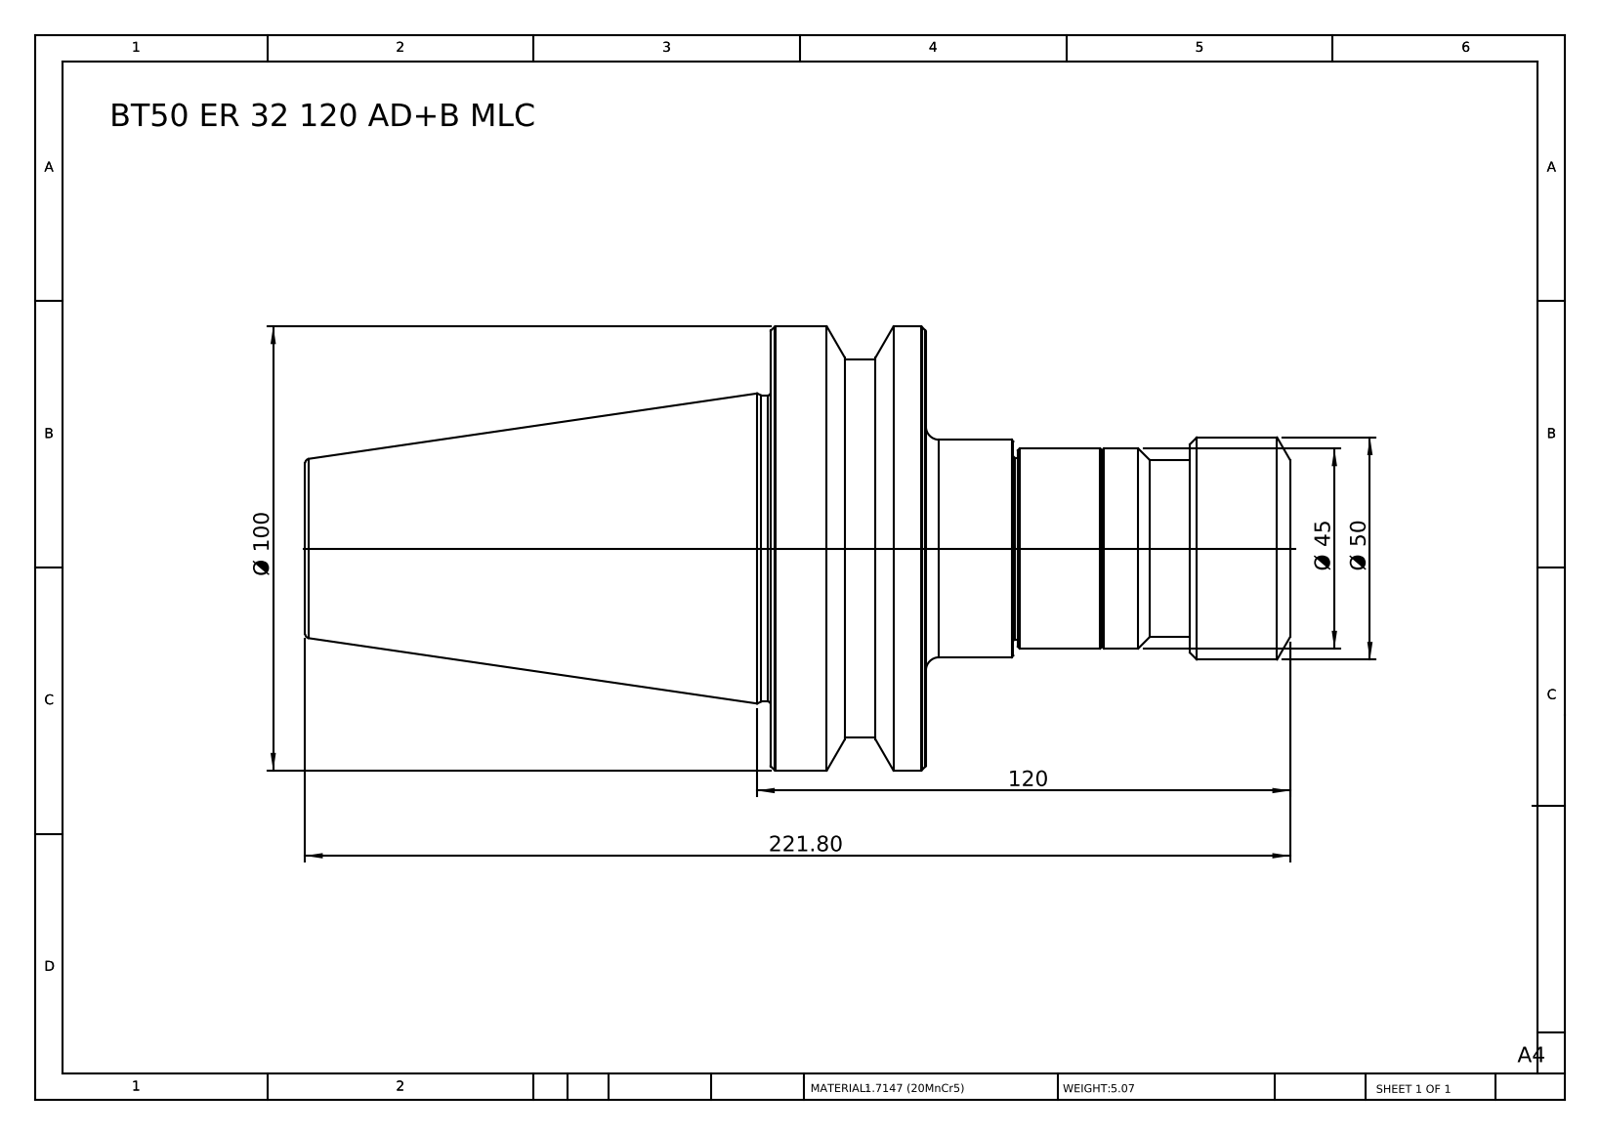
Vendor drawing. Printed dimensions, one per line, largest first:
221.80
120
Ø 100
Ø 50
Ø 45
